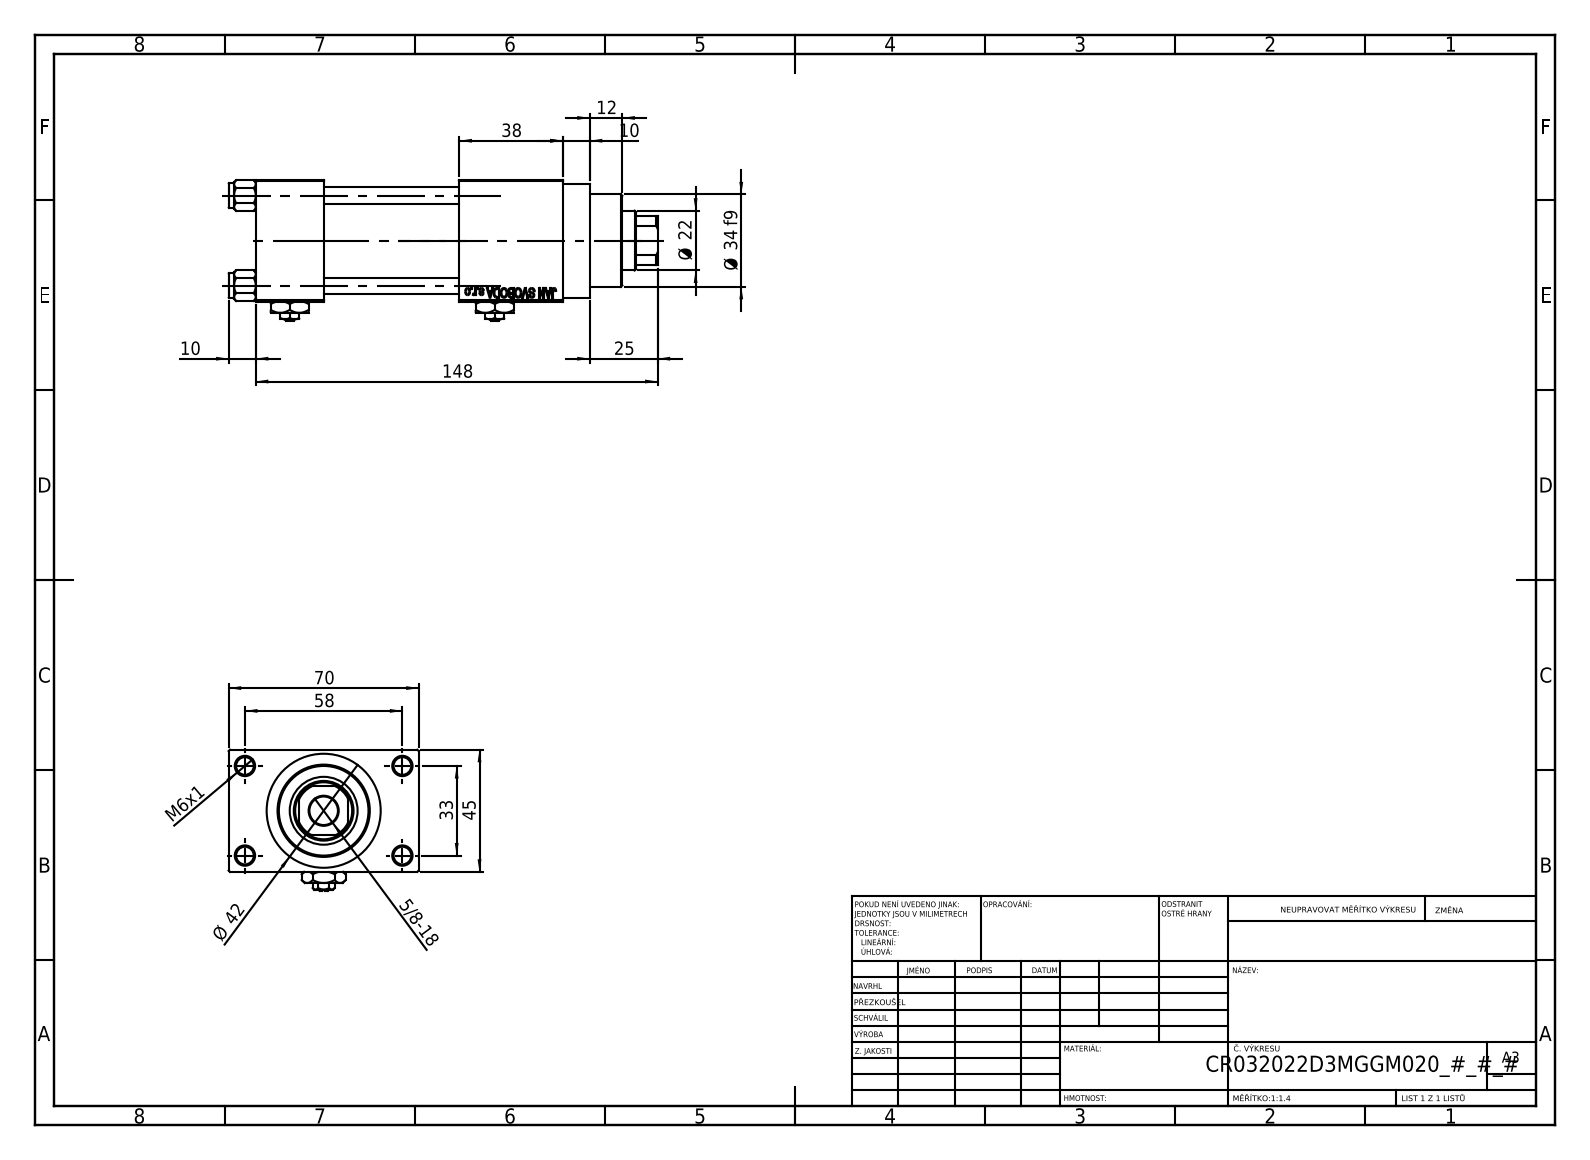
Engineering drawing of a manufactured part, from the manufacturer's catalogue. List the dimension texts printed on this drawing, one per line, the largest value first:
148
70
58
45
Ø 42
38
Ø 34 f9
33
25
Ø 22
12
10
10
M6x1
5/8-18
